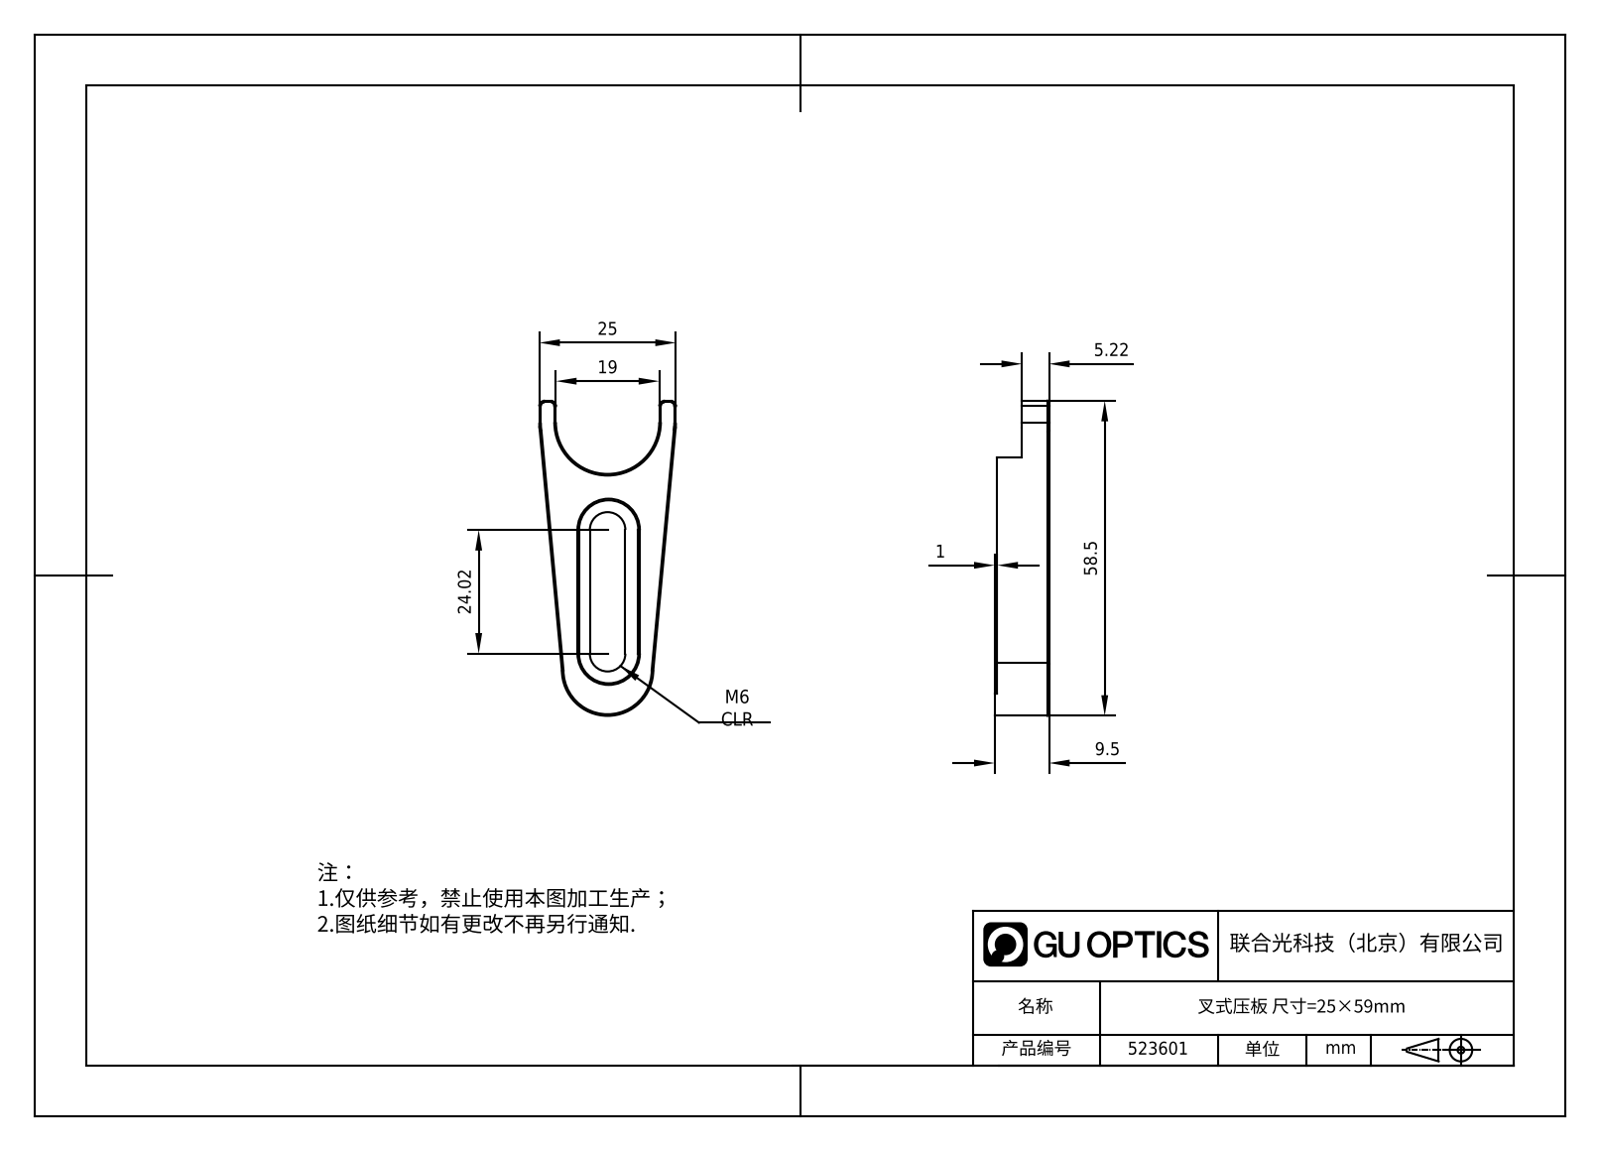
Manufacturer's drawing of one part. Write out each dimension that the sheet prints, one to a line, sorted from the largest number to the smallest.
58.5
25
24.02
19
9.5
5.22
1
